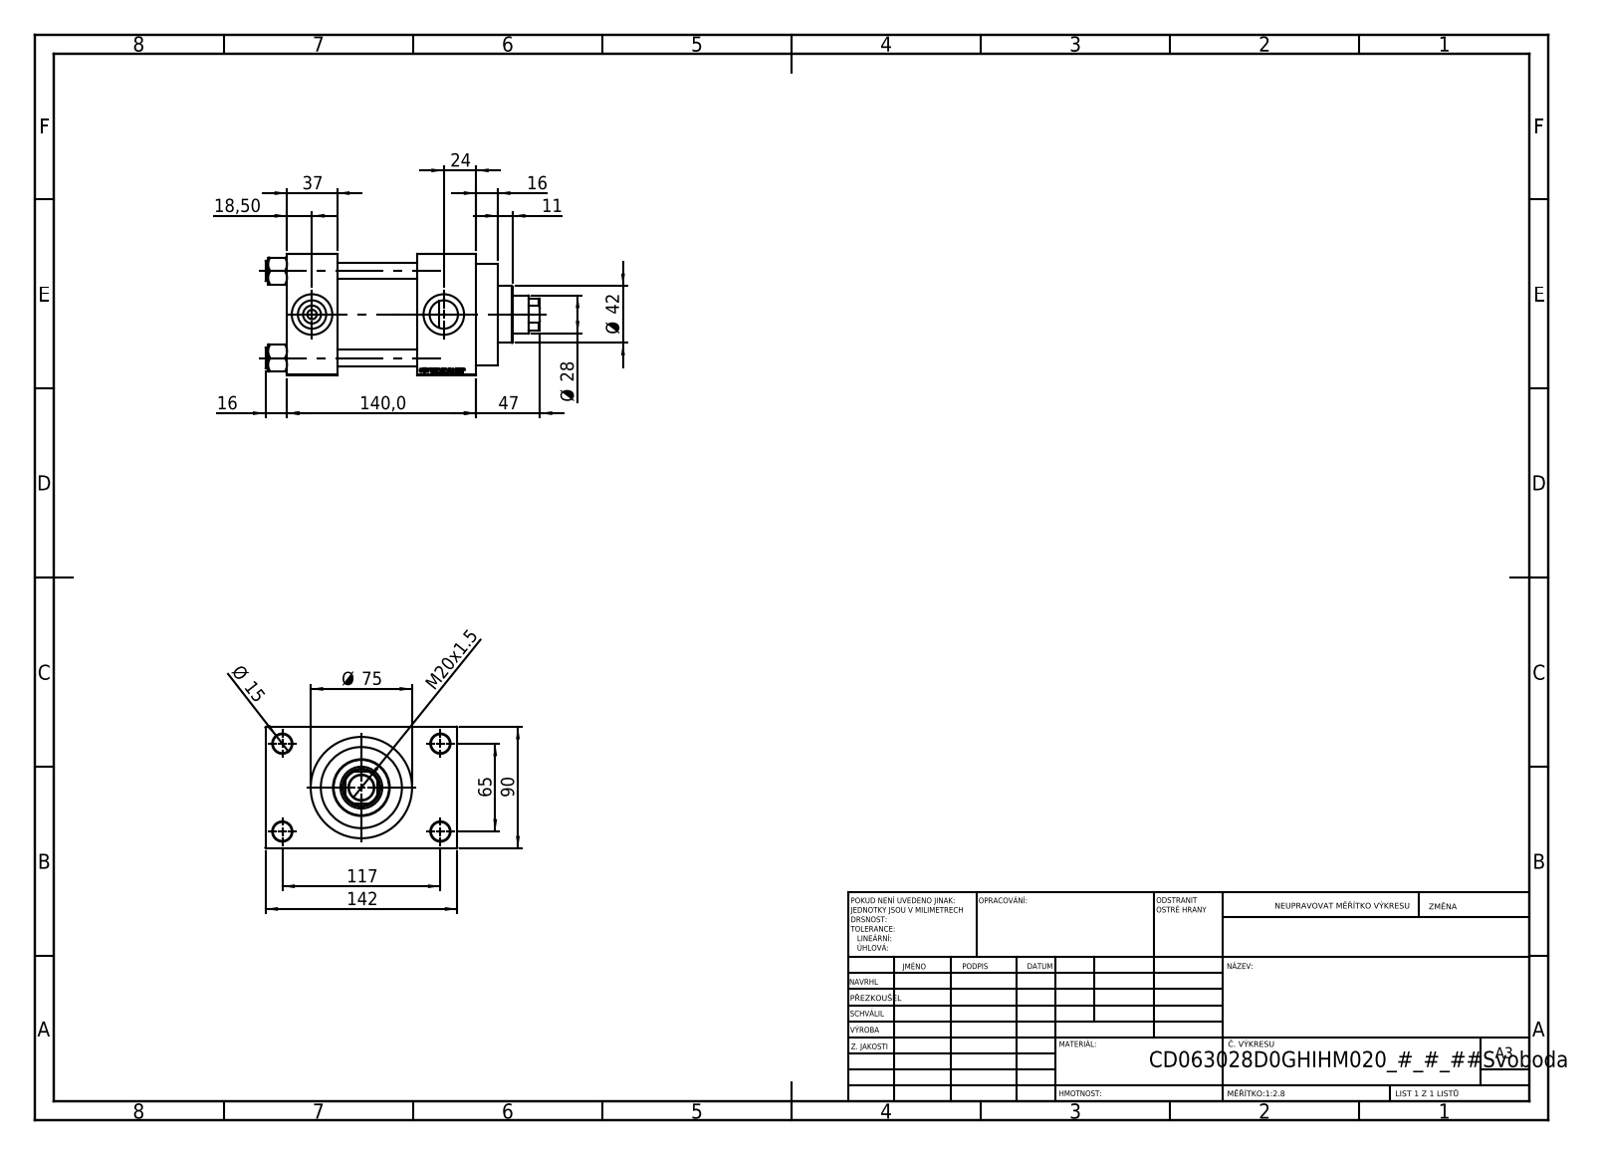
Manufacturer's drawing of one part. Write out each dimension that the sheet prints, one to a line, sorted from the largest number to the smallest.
142
140,0
117
90
Ø 75
65
47
Ø 42
37
Ø 28
24
M20x1.5
18,50
16
16
Ø 15
11
